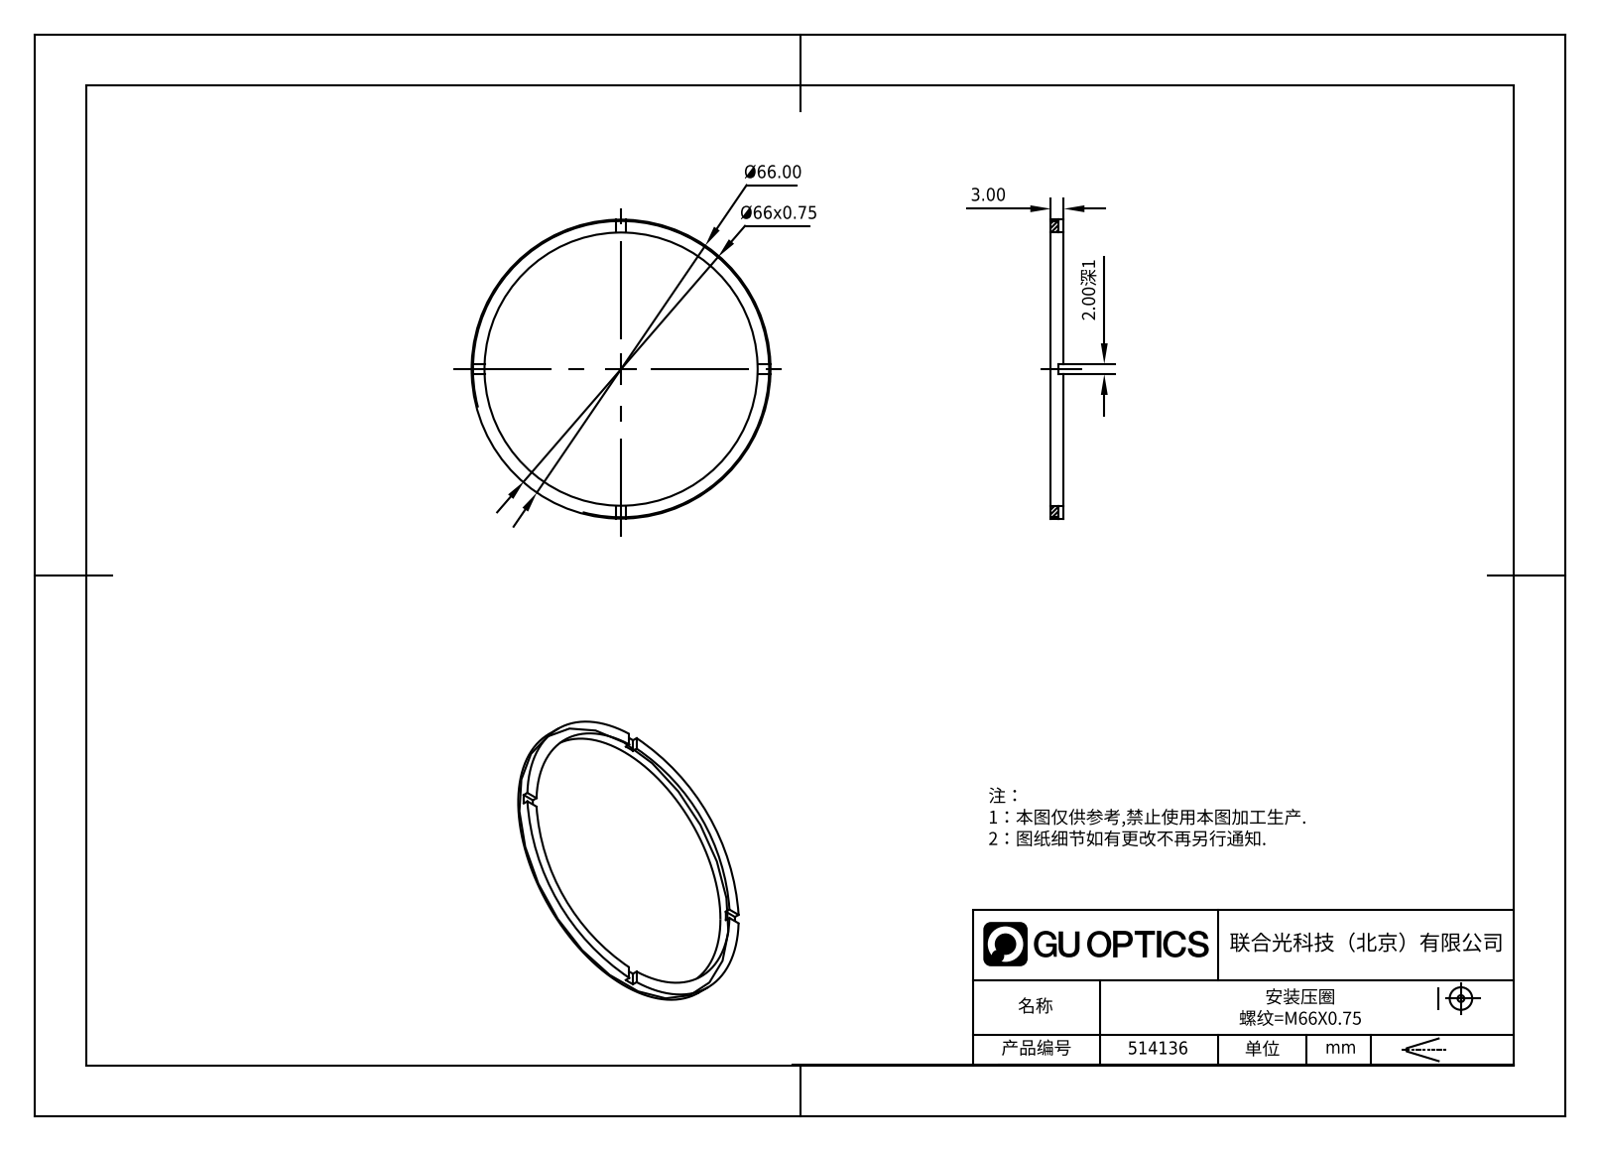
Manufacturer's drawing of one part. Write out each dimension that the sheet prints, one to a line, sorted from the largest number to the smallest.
Ø66.00
Ø66x0.75
3.00
2.00深1
